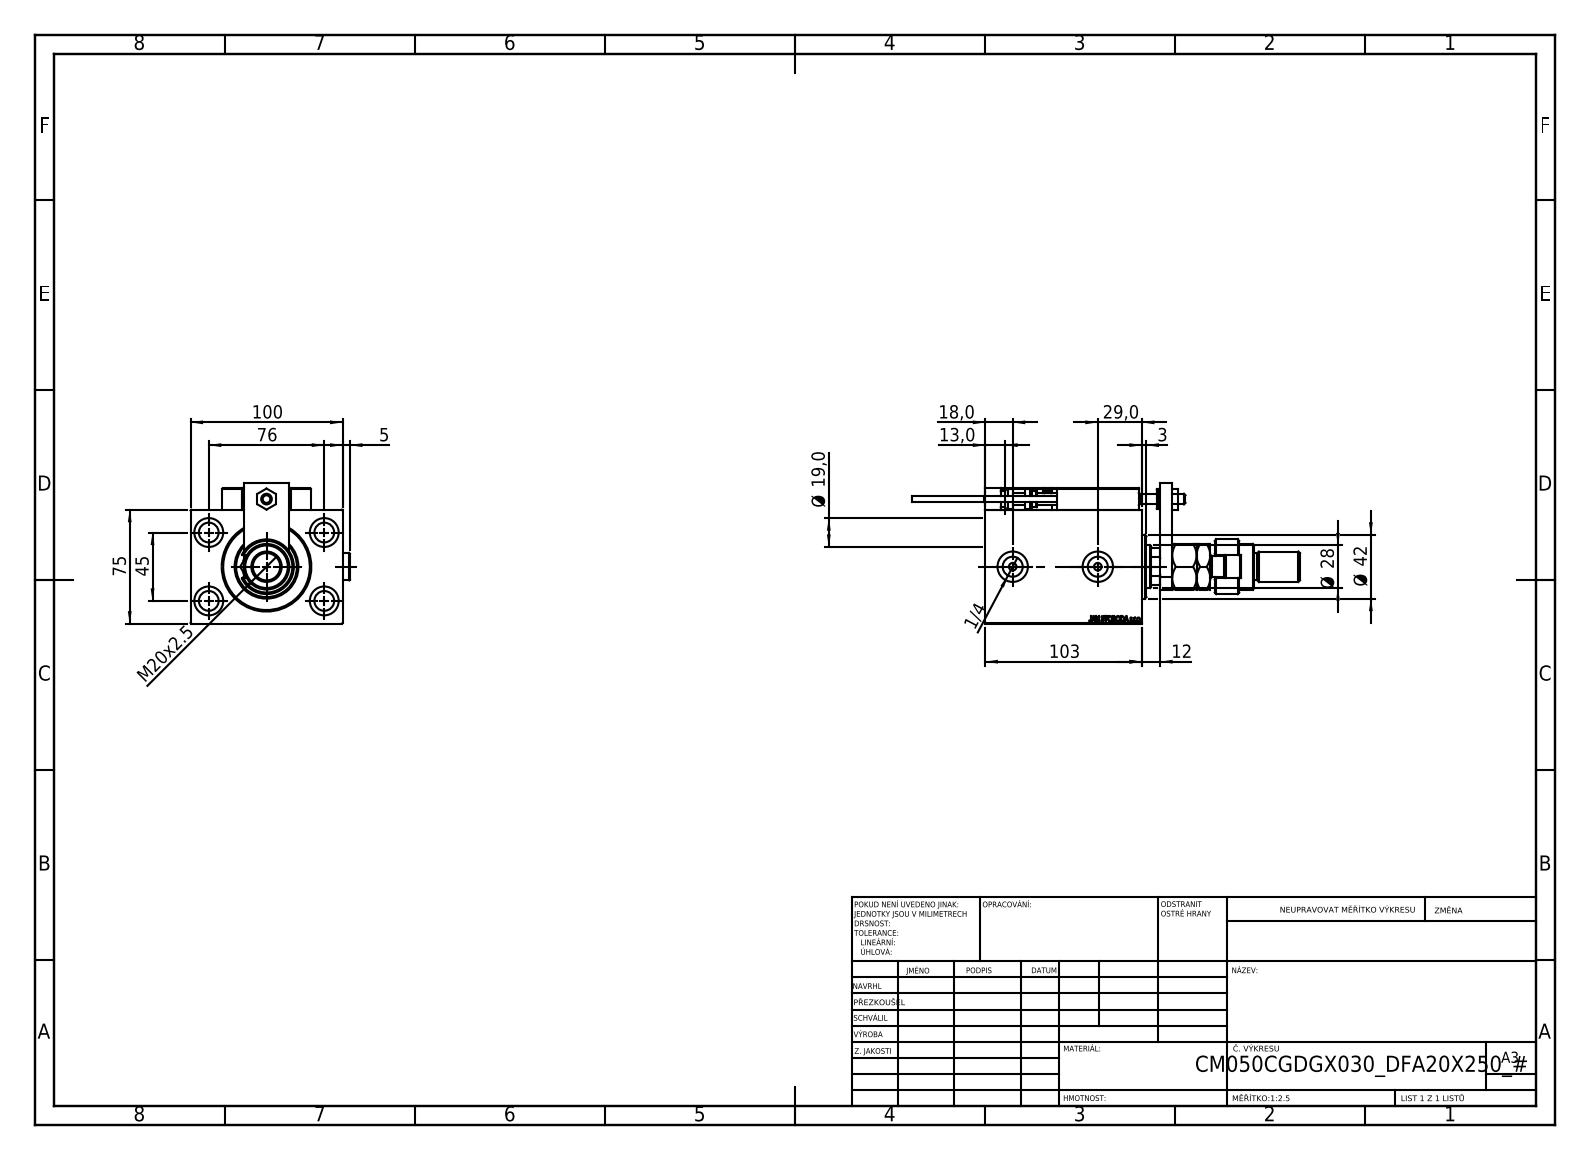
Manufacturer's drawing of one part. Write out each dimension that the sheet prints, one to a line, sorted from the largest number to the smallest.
103
100
76
75
45
Ø 42
29,0
Ø 28
M20x2.5
Ø 19,0
18,0
13,0
12
5
3
1/4
